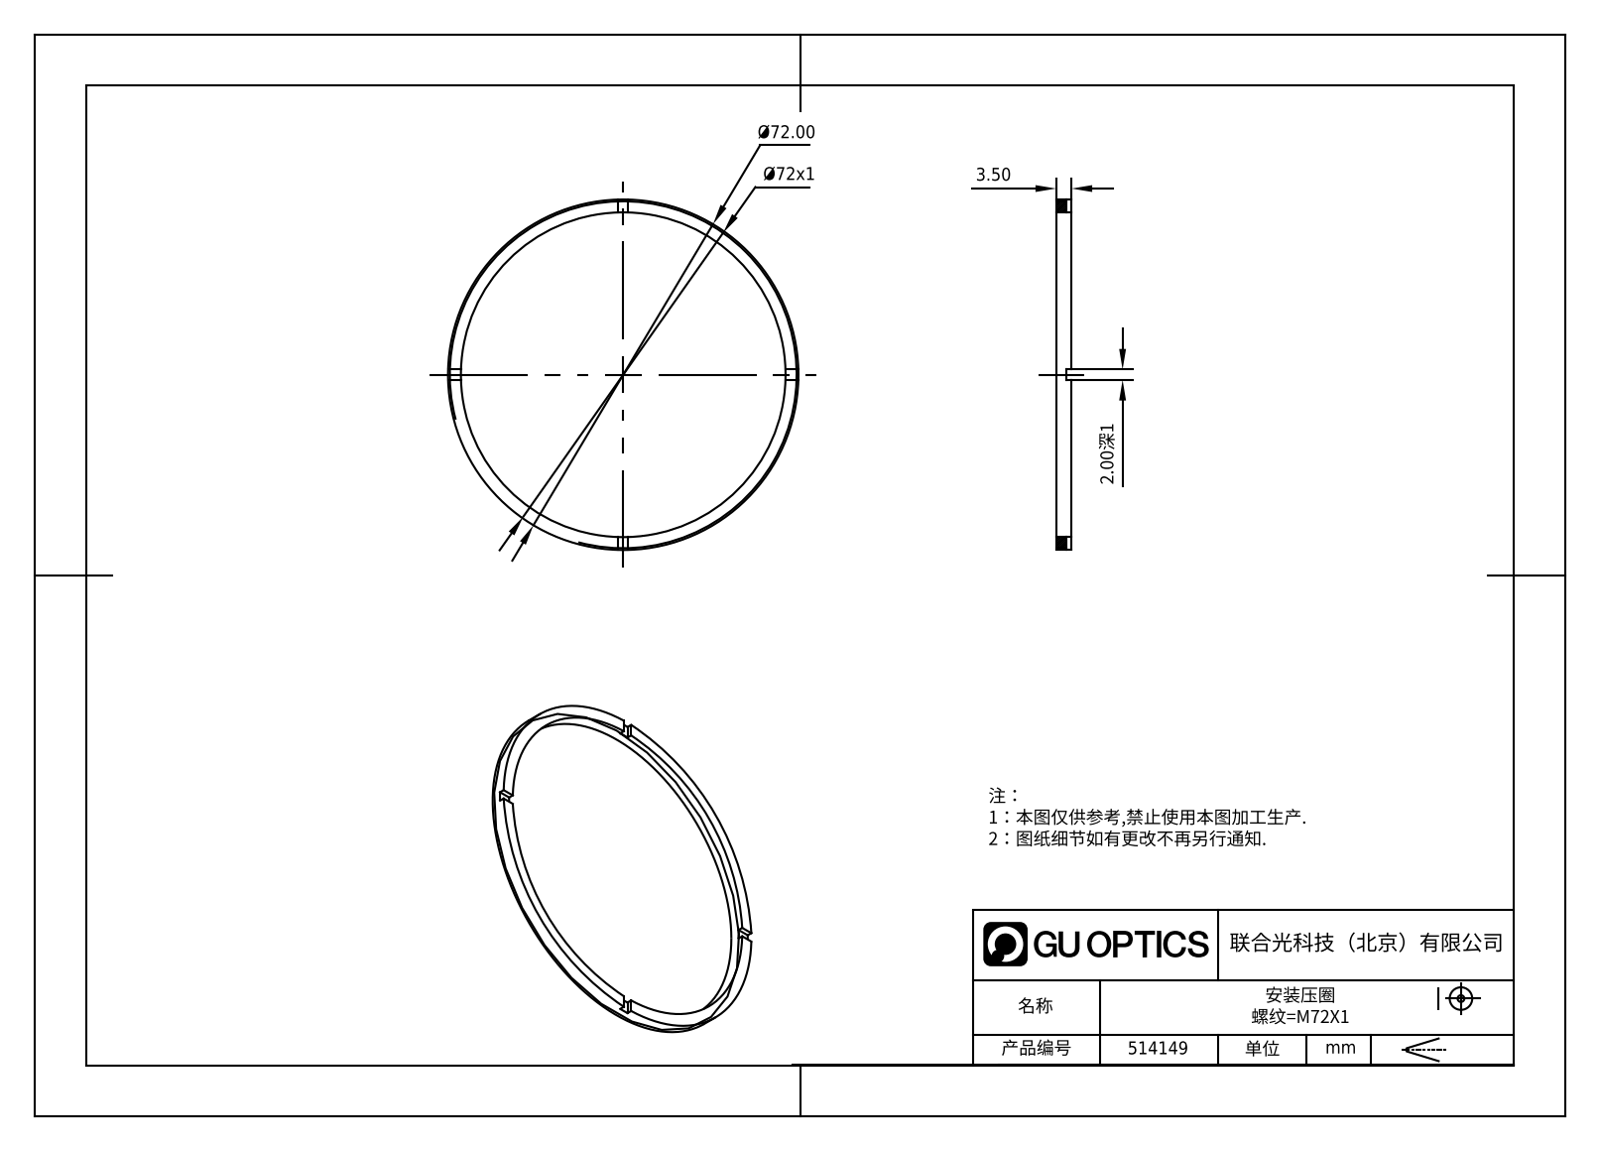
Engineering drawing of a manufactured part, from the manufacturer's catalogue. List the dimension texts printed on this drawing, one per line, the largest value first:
Ø72.00
Ø72x1
3.50
2.00深1
